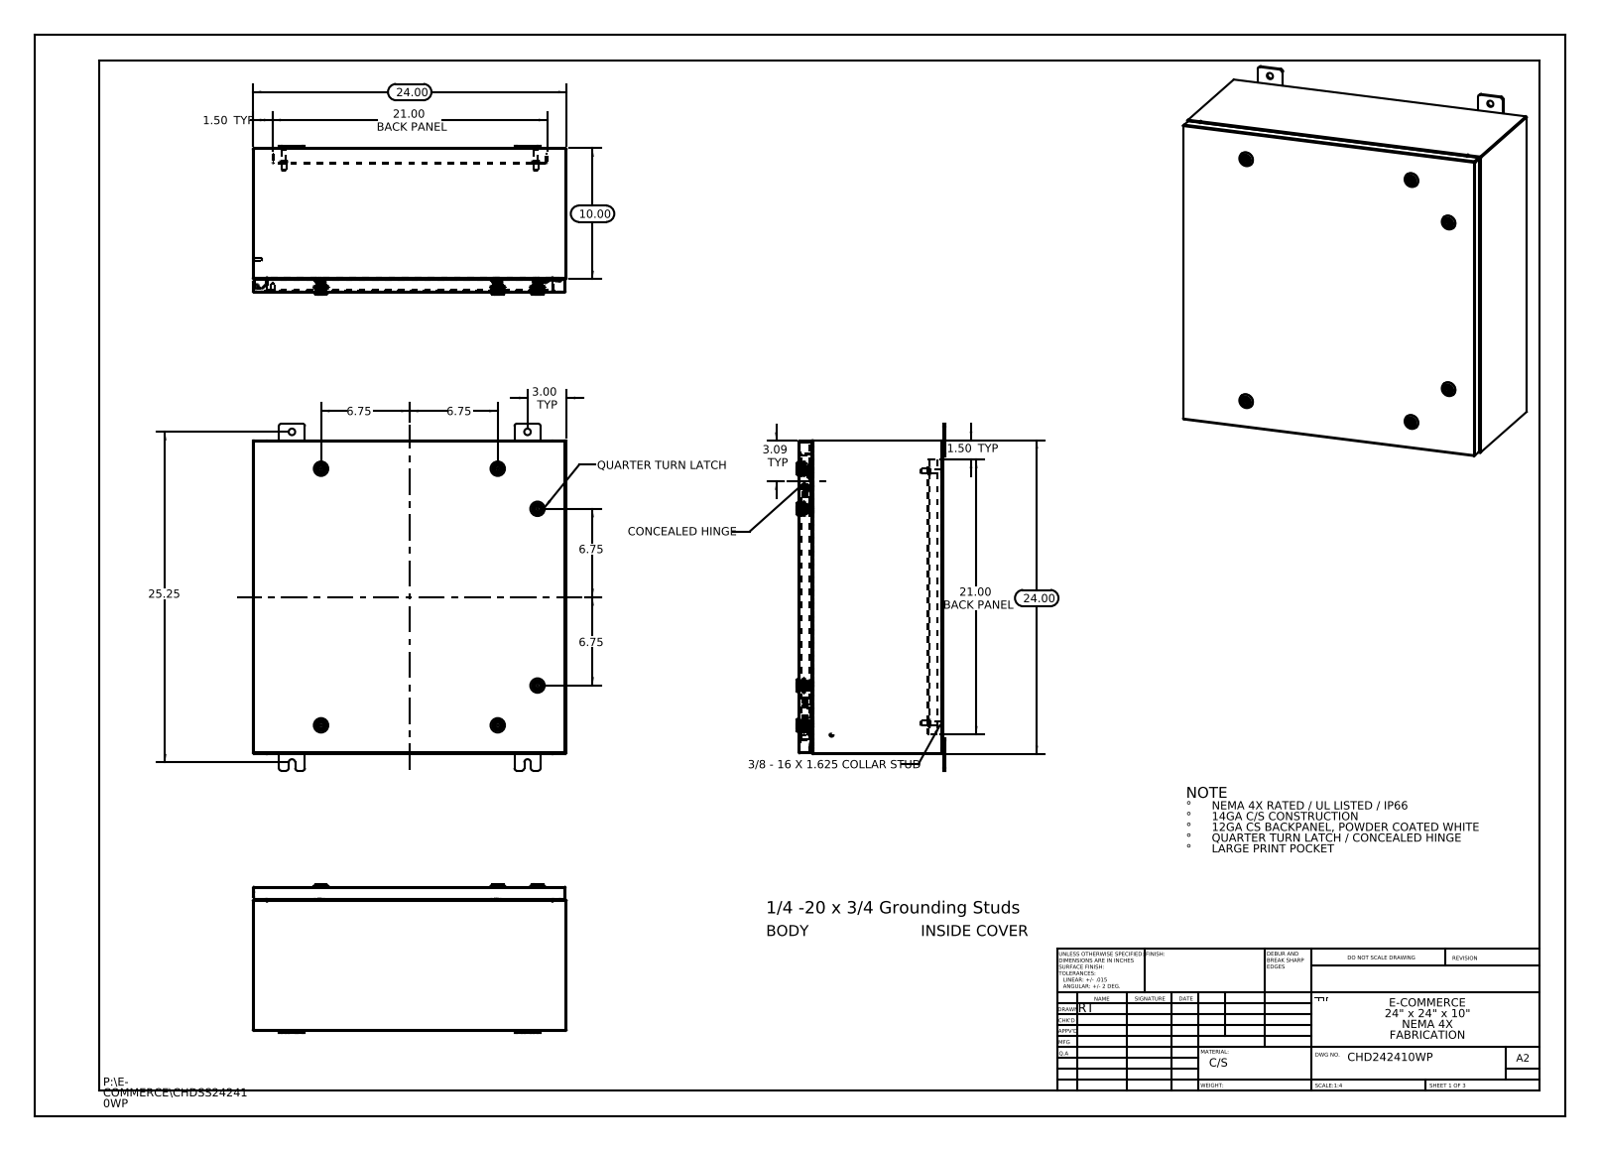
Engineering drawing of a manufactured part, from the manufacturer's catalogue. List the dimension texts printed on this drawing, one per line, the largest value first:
25.25
24.00
24.00
21.00 BACK PANEL
21.00 BACK PANEL
10.00
6.75
6.75
6.75
6.75
3.09 TYP
3.00 TYP
1.50 TYP
1.50 TYP
